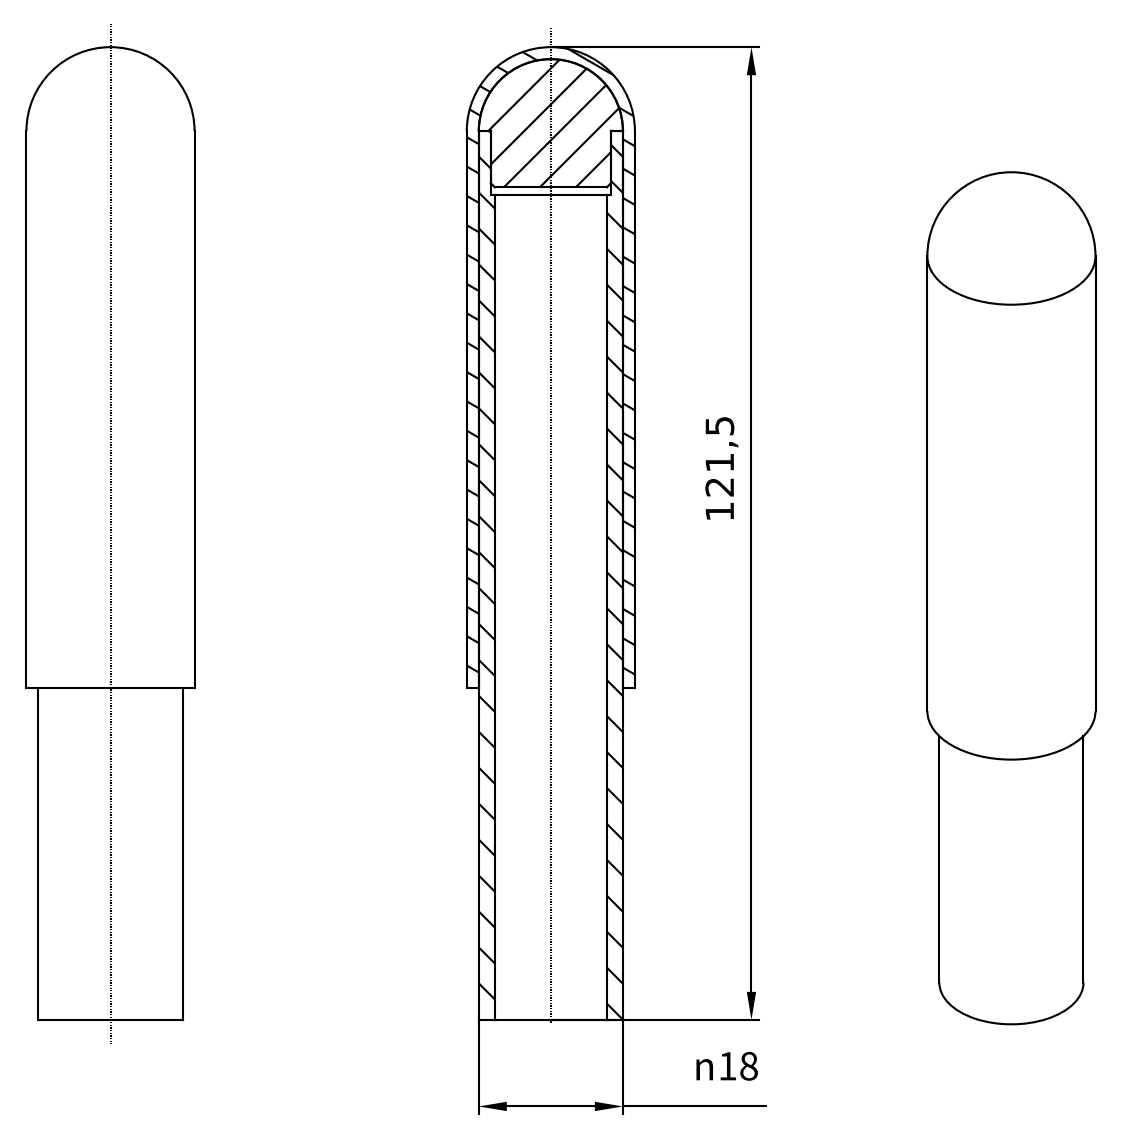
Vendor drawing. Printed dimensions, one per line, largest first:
121,5
n18
